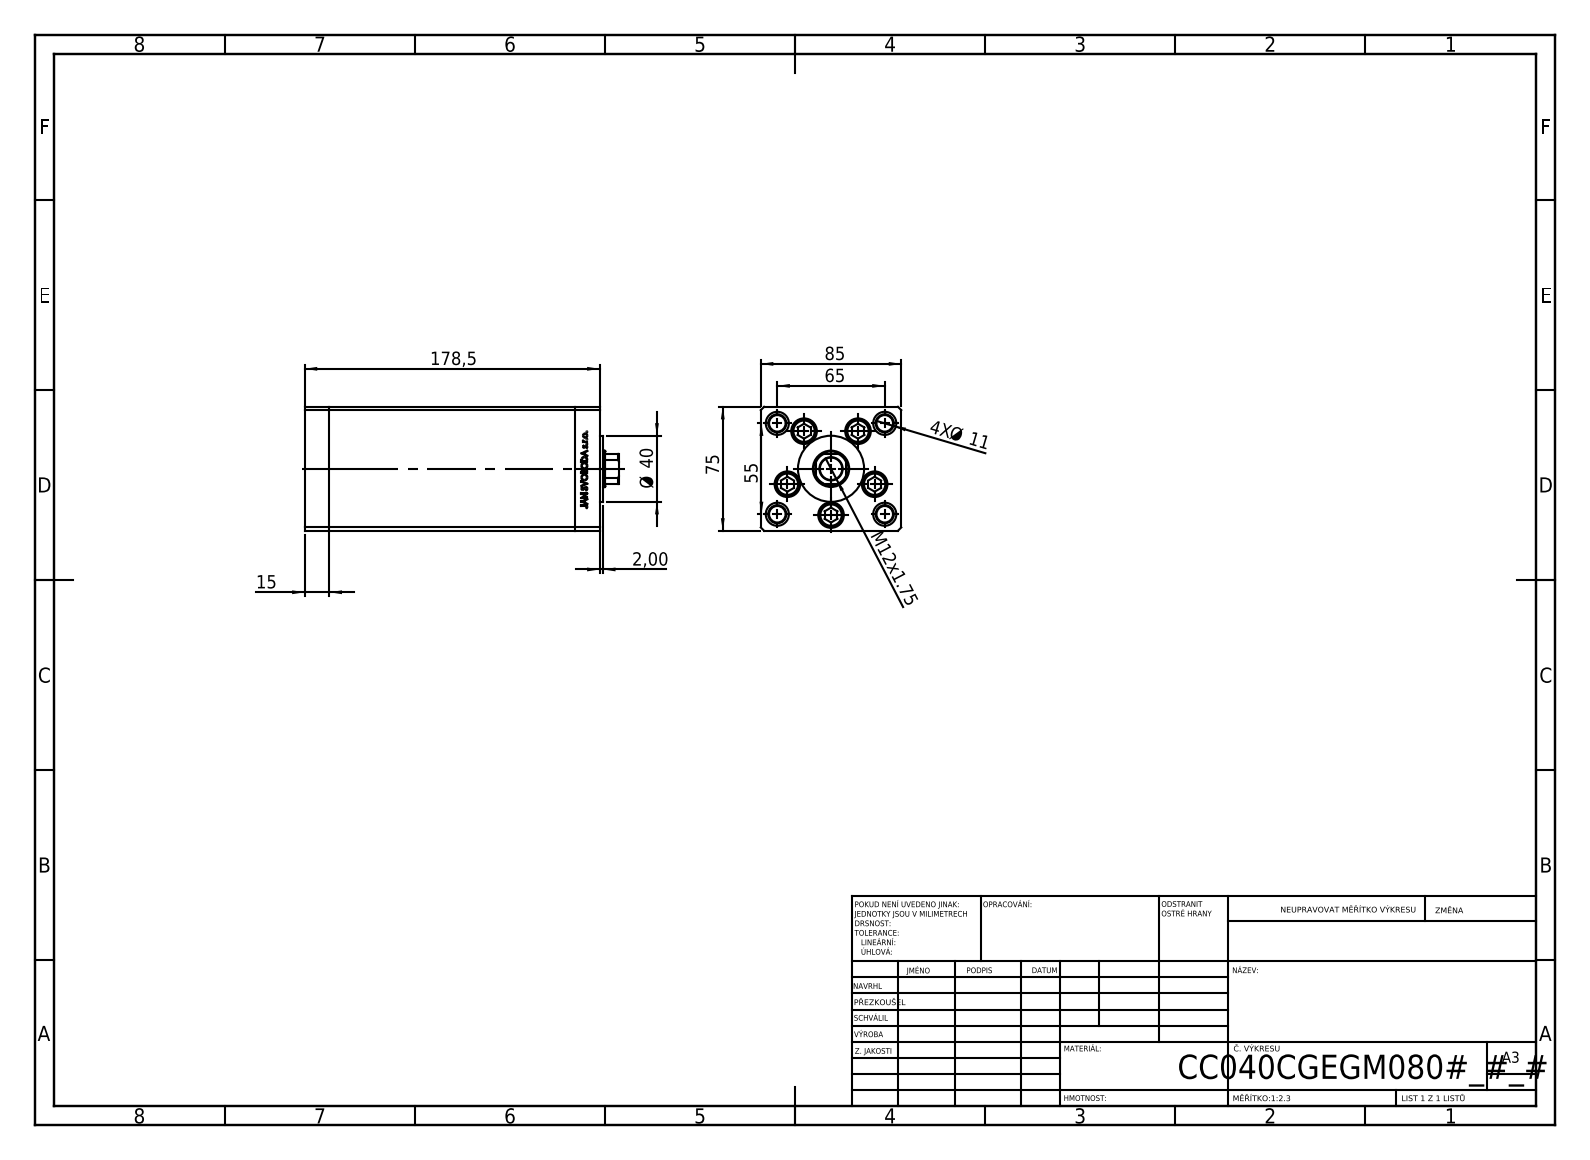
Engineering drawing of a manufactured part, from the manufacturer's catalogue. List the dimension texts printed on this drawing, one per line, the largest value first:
178,5
85
75
65
55
Ø 40
15
M12x1.75
4X Ø 11
2,00
